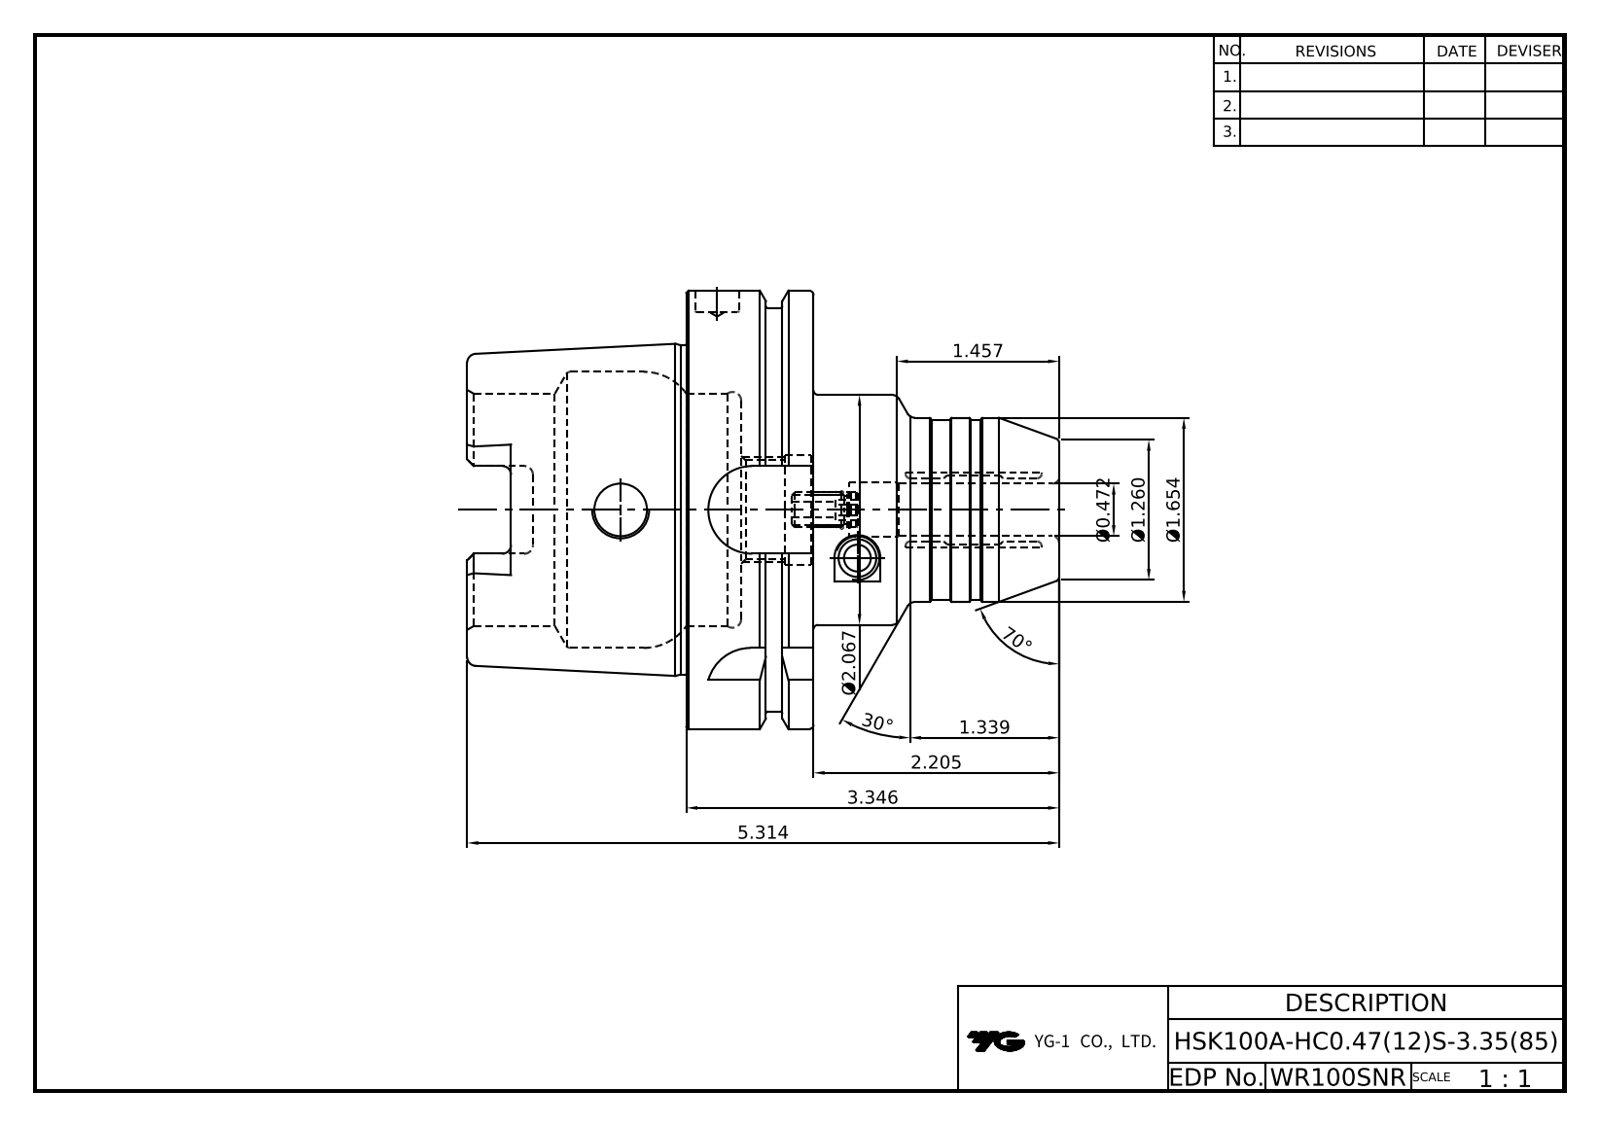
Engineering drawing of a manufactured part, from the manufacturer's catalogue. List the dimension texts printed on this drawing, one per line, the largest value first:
70°
30°
5.314
3.346
2.205
Ø2.067
Ø1.654
1.457
1.339
Ø1.260
Ø0.472
